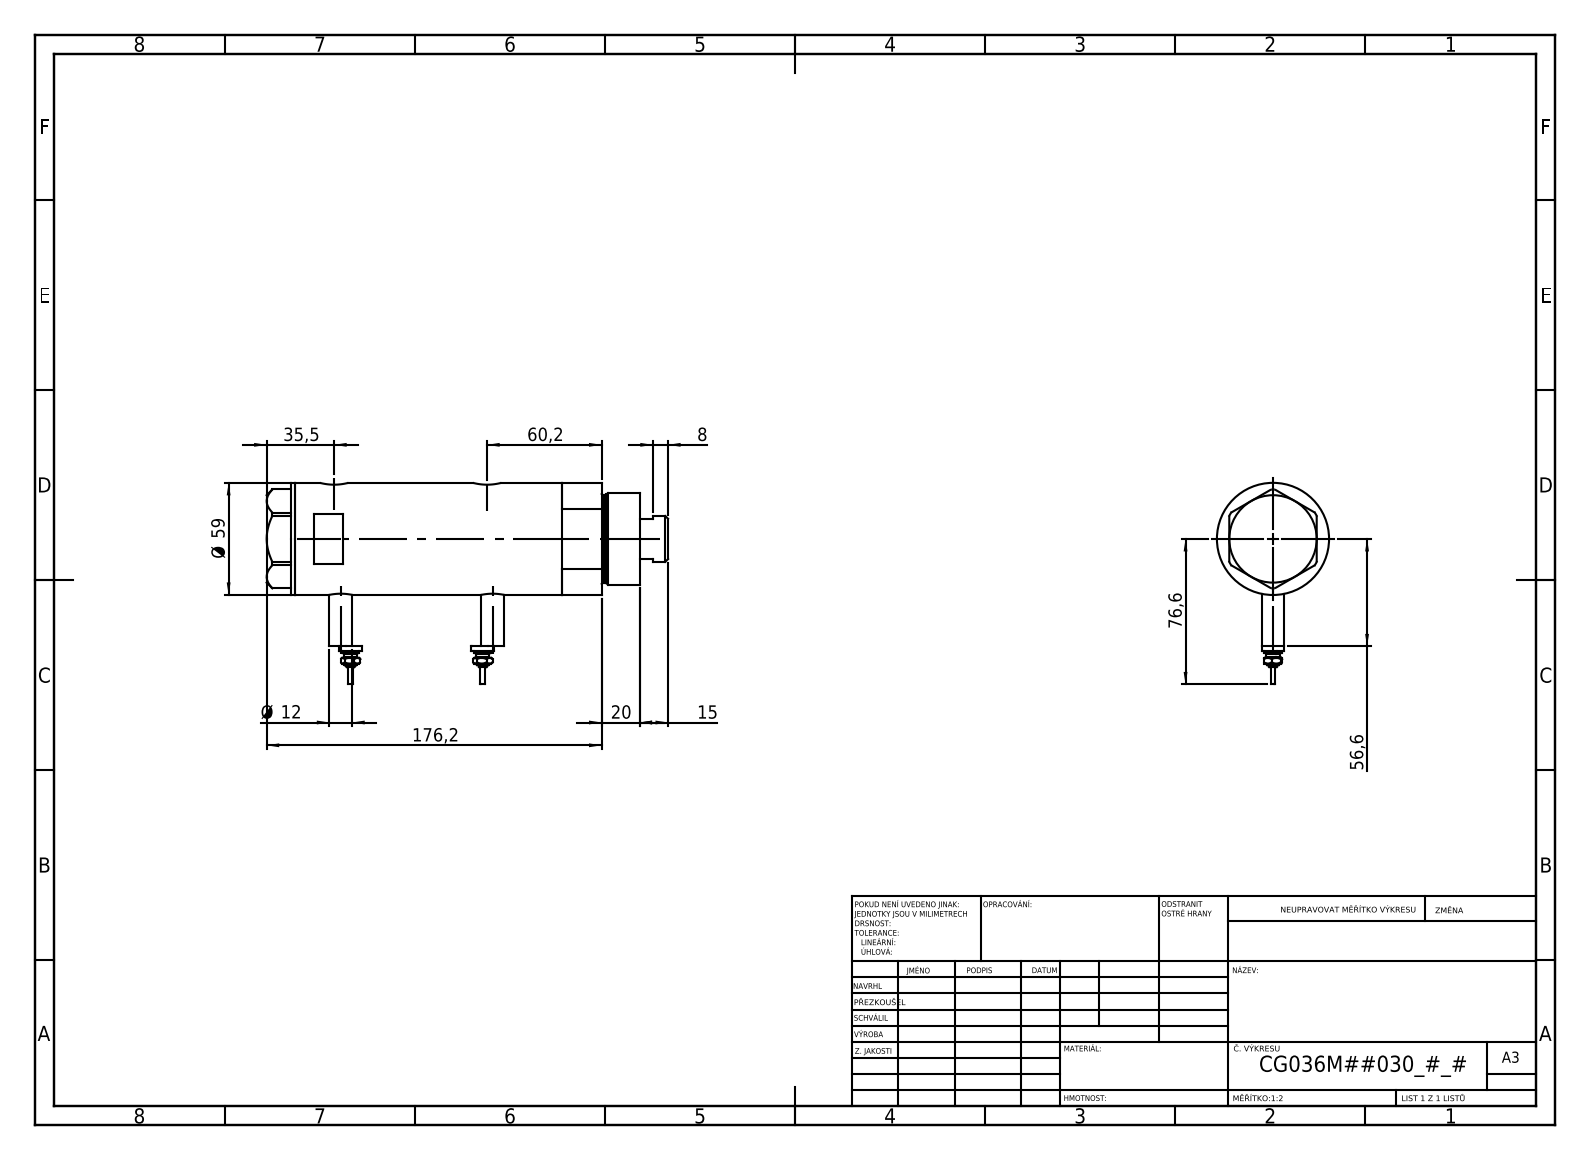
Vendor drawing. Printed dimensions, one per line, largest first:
176,2
76,6
60,2
Ø 59
56,6
35,5
20
15
Ø 12
8
